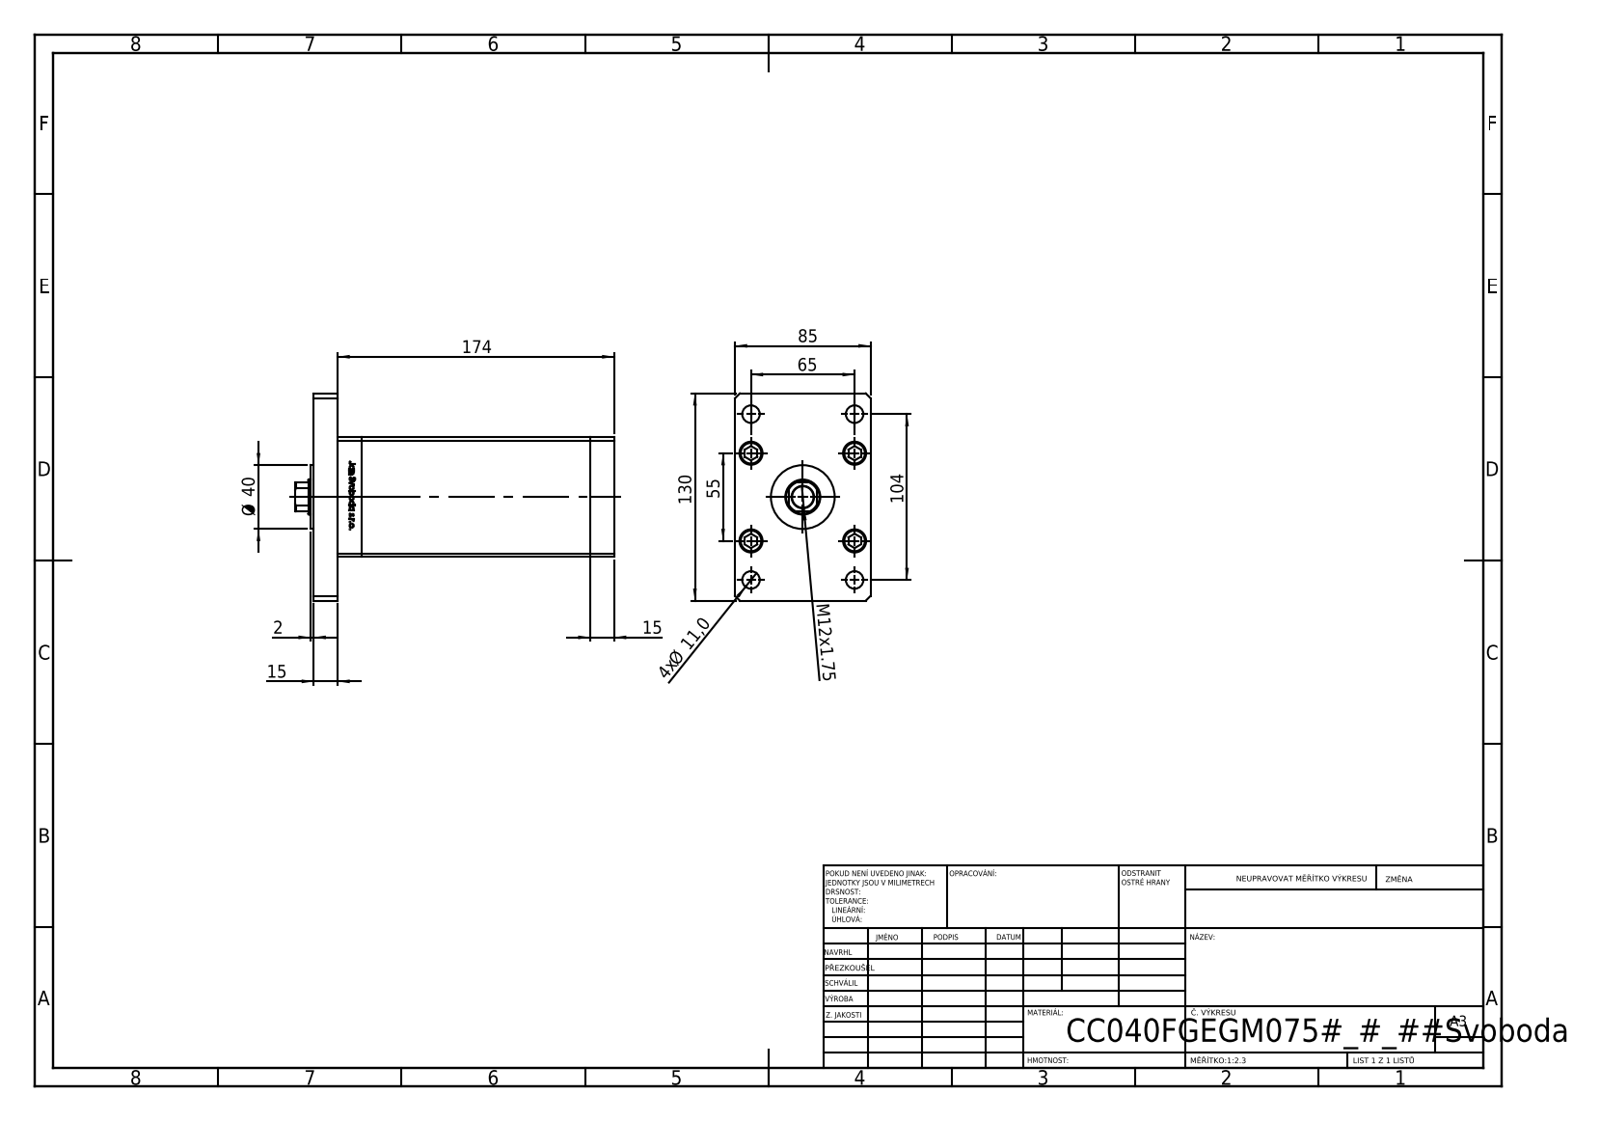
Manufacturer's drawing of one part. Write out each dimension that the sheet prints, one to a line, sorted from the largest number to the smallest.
174
130
104
85
65
55
Ø 40
15
15
M12x1.75
4x Ø 11,0
2
